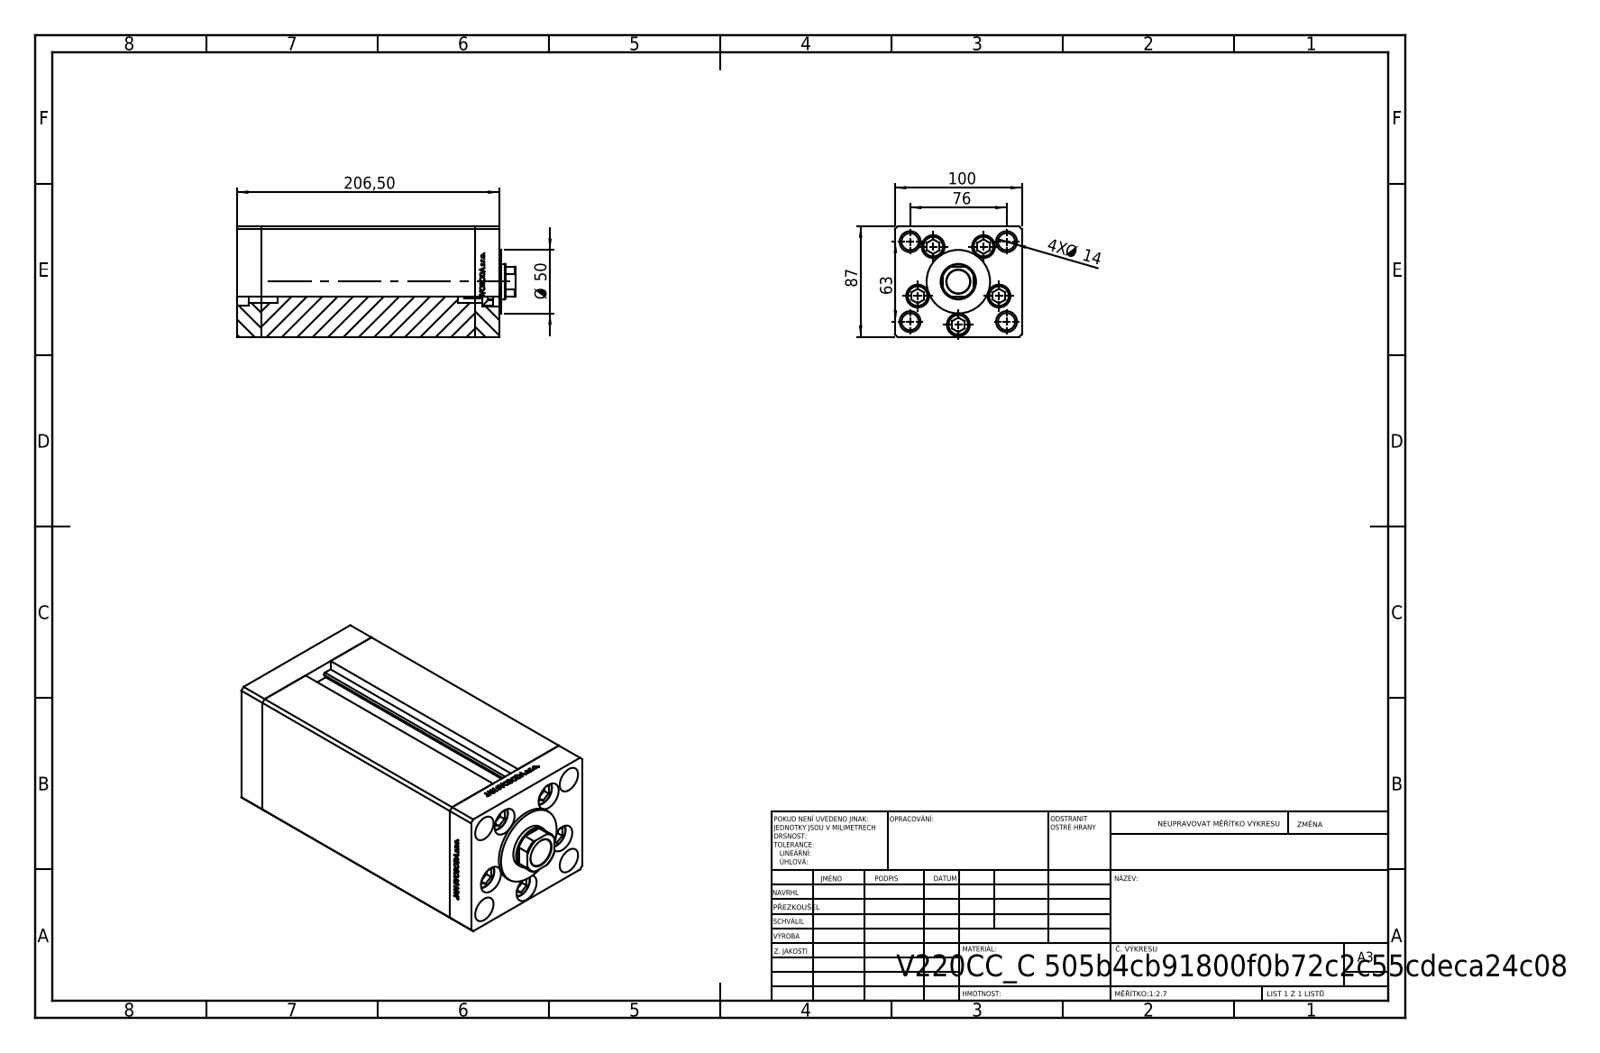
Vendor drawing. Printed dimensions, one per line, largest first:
206,50
100
87
76
63
Ø 50
4X Ø 14
